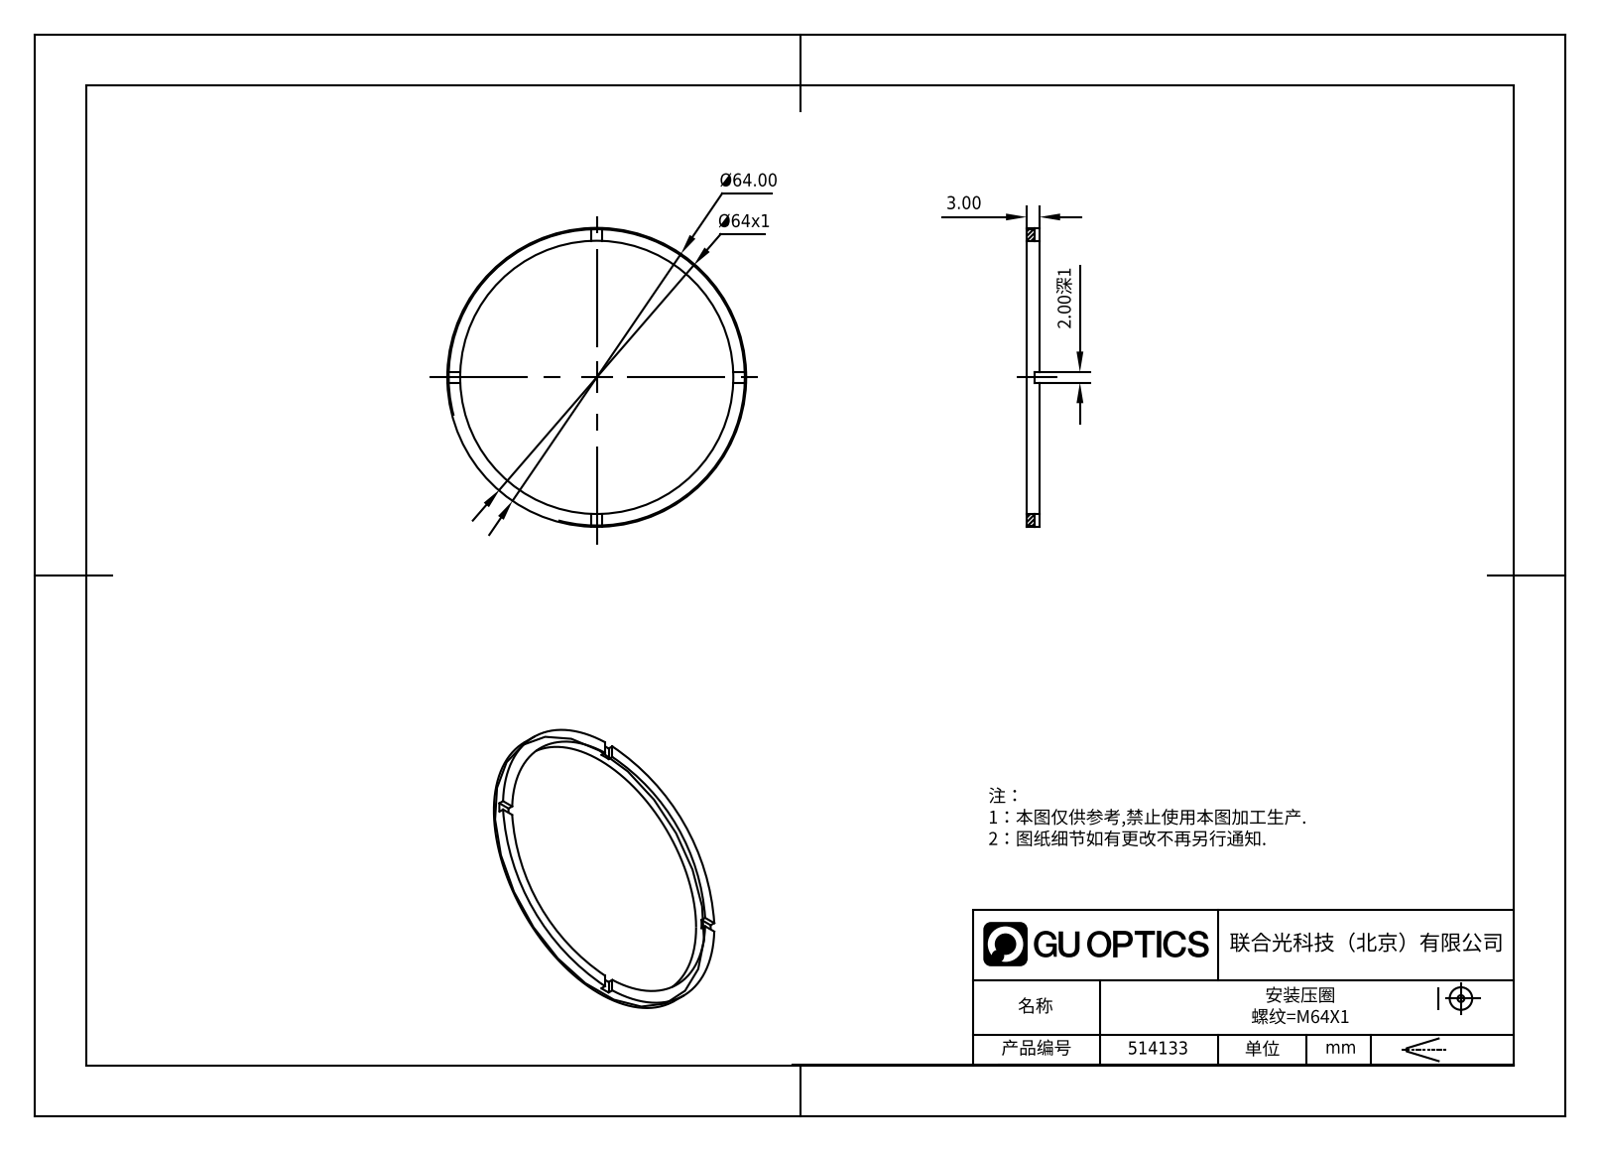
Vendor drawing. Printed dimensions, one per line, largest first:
Ø64.00
Ø64x1
3.00
2.00深1
